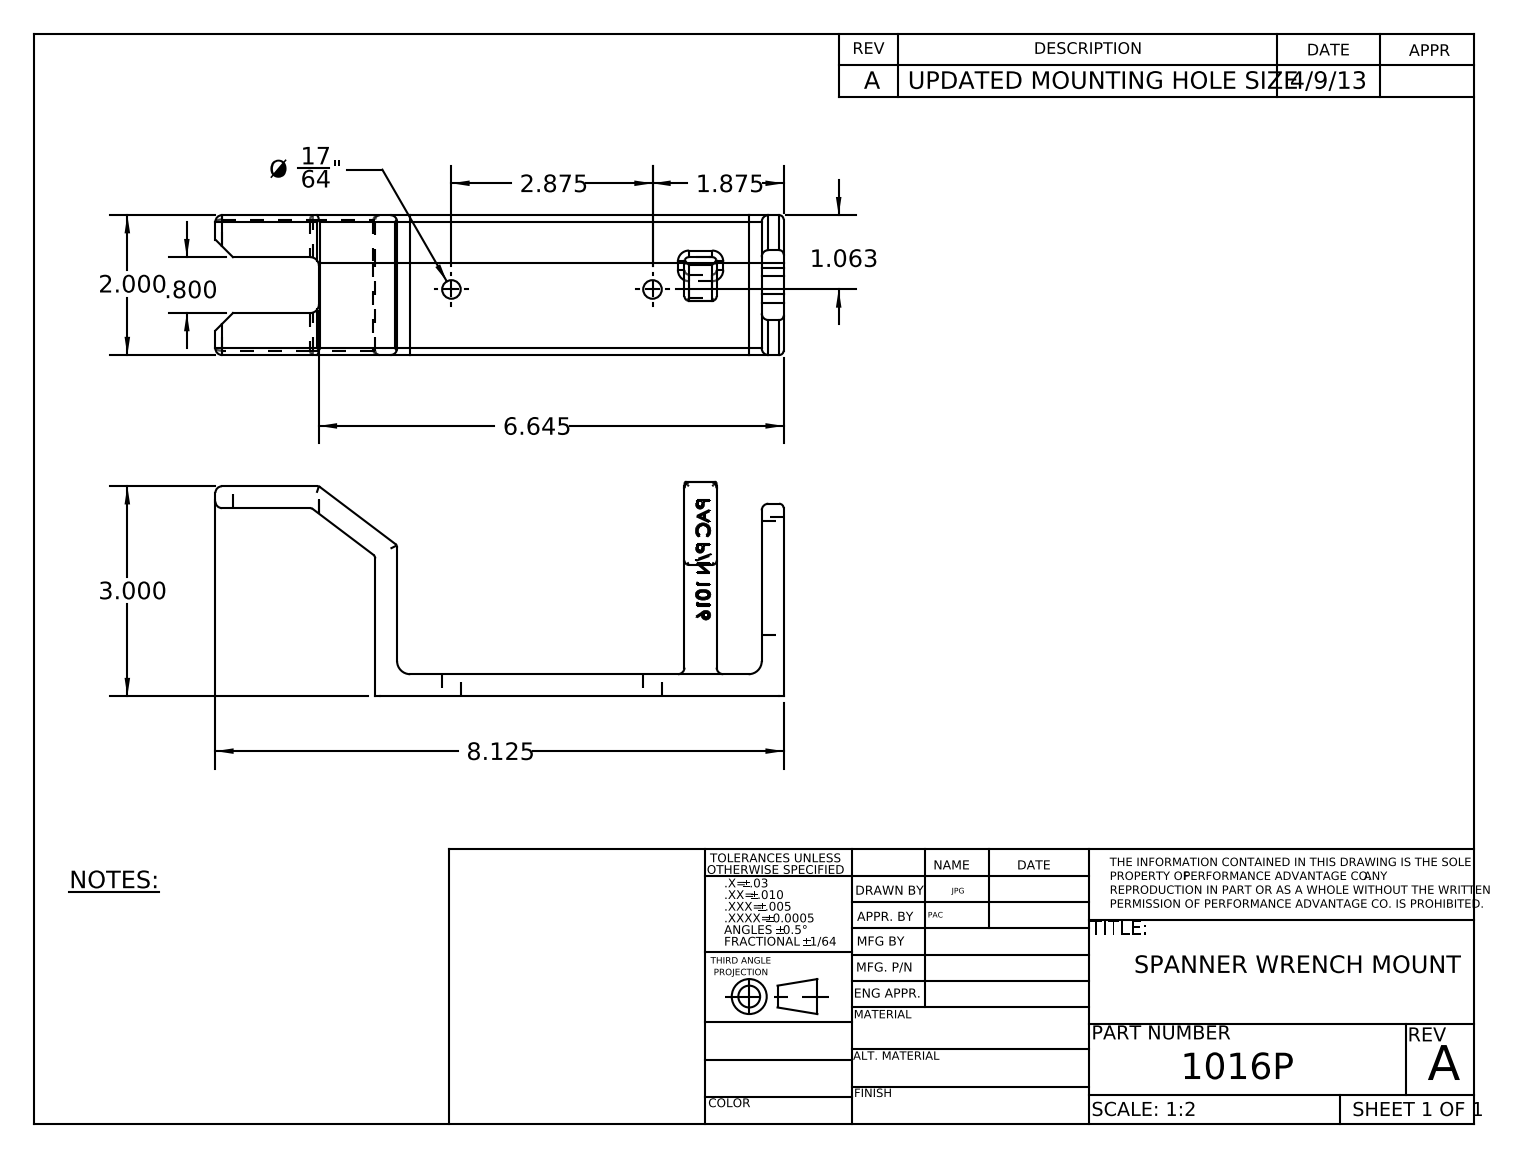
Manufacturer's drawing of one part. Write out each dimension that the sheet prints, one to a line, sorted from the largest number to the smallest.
Ø 17 64 "
8.125
6.645
3.000
2.875
2.000
1.875
1.063
.800
